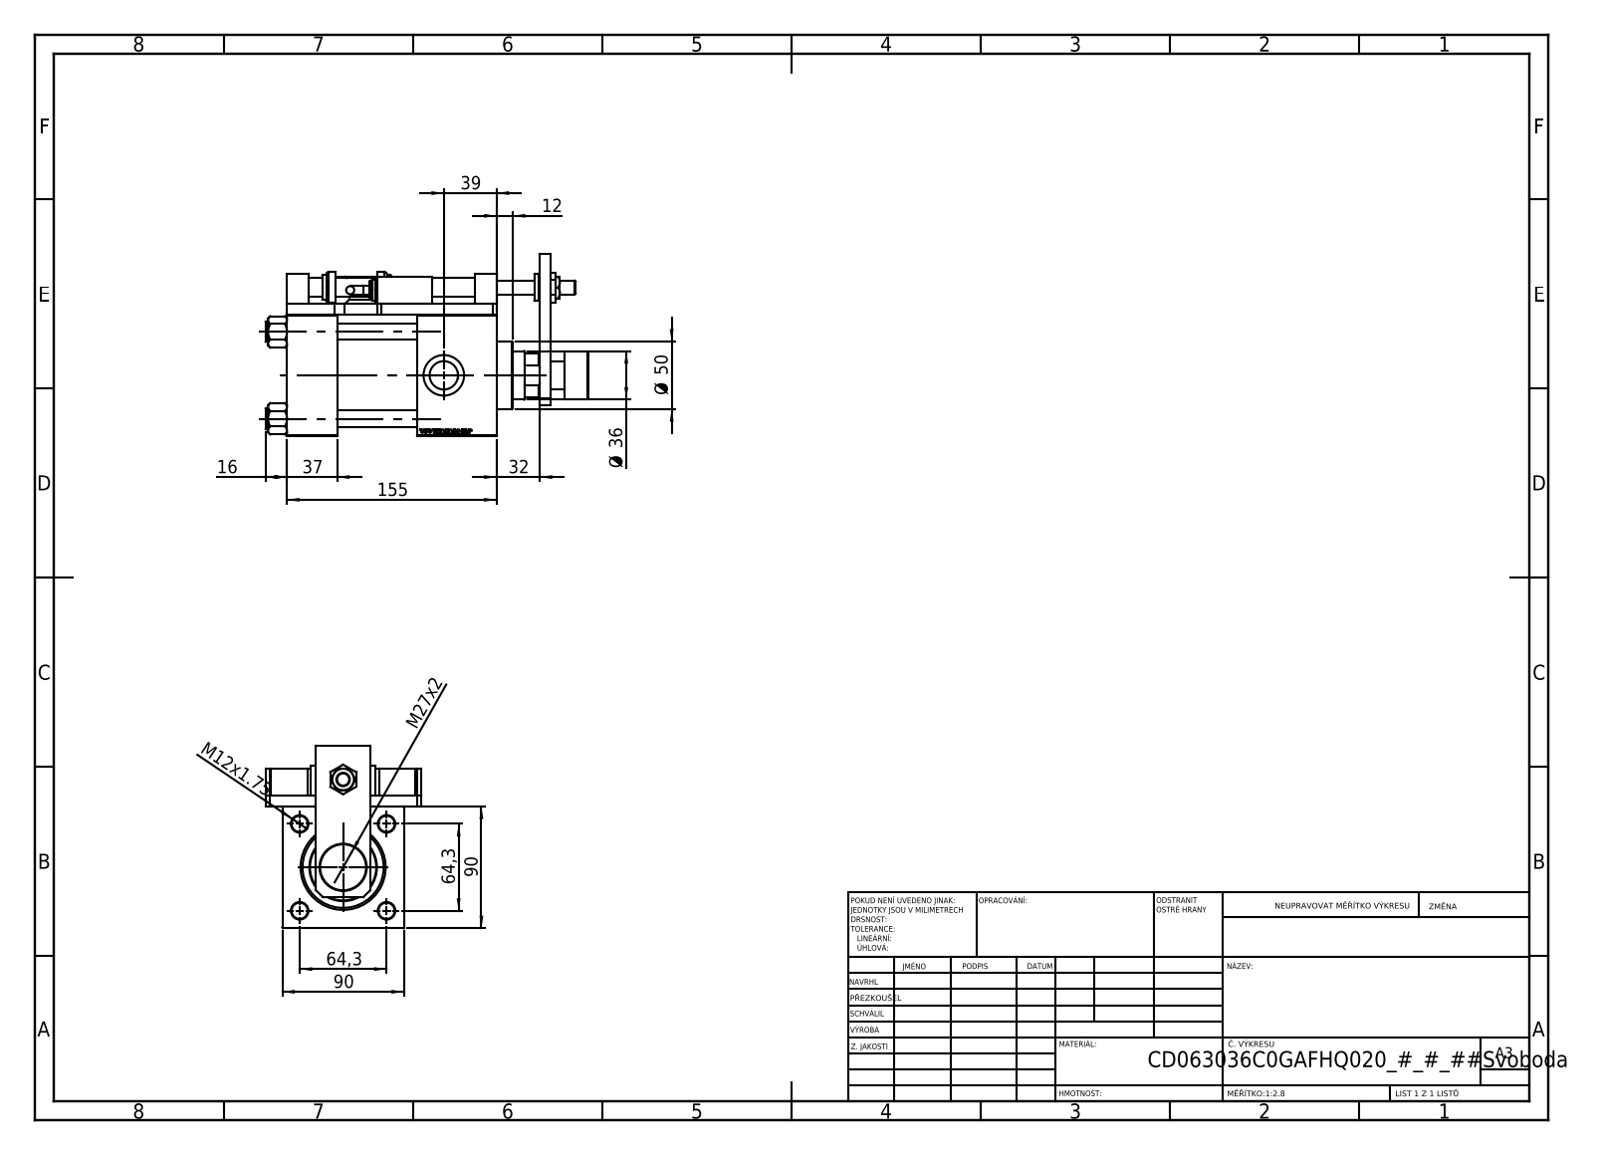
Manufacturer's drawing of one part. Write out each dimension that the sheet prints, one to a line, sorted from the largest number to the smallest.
155
90
90
64,3
64,3
Ø 50
39
37
Ø 36
32
M27x2
16
12
M12x1.75
